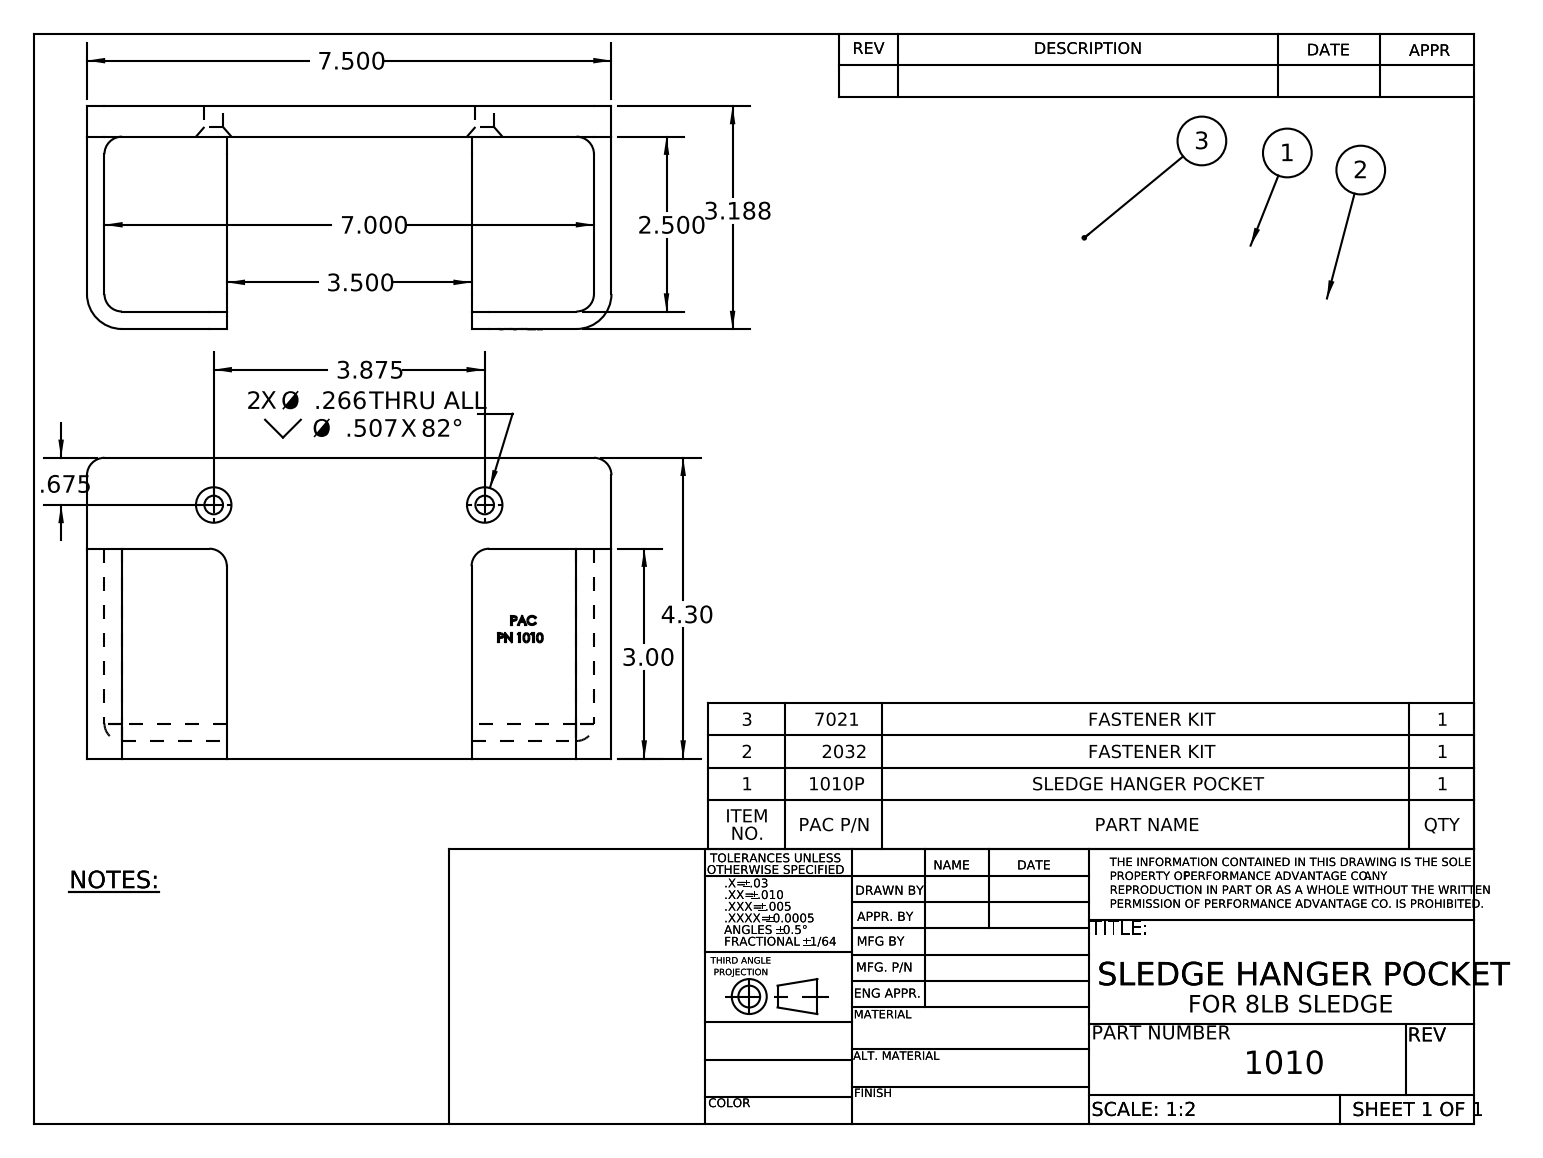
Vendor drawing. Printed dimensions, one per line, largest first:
7.500
7.000
4.30
3.875
3.500
3.188
3.00
2.500
.675
Ø .507 X 82° 2 X Ø .266 THRU ALL
